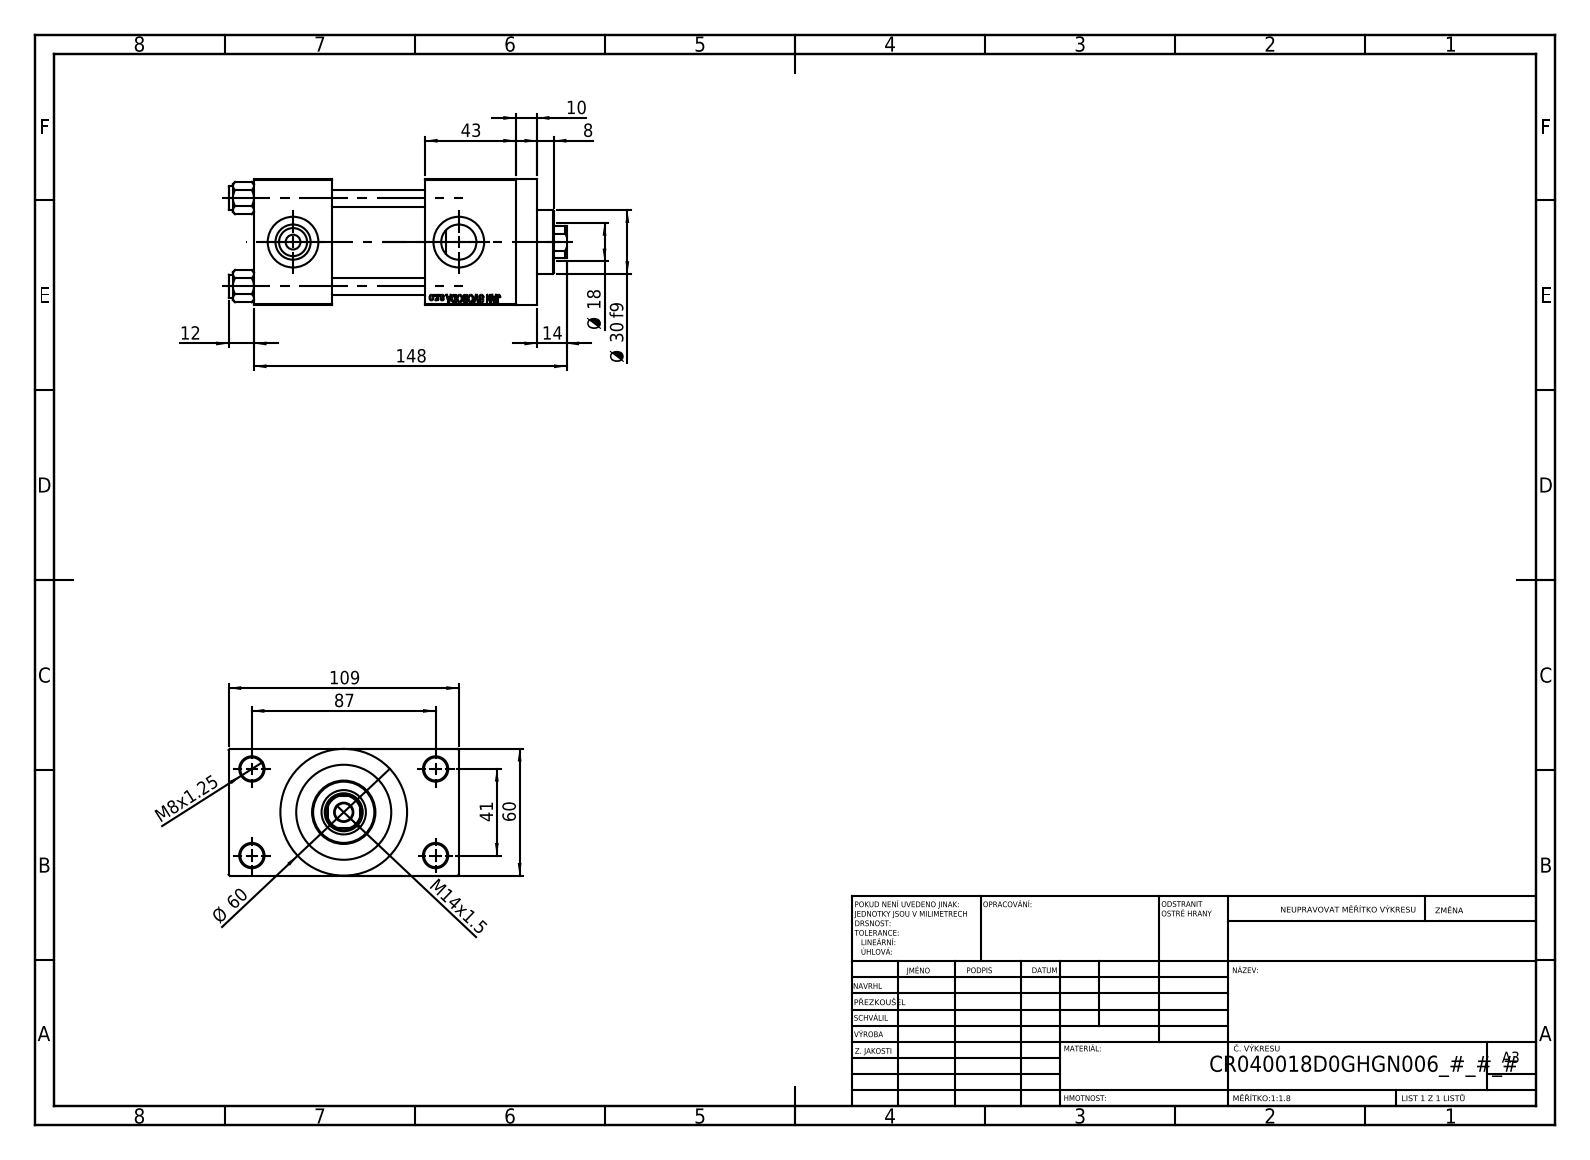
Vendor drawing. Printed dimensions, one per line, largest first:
148
109
87
Ø 60
60
43
41
Ø 30 f9
Ø 18
14
M14x1.5
12
10
8
M8x1.25
